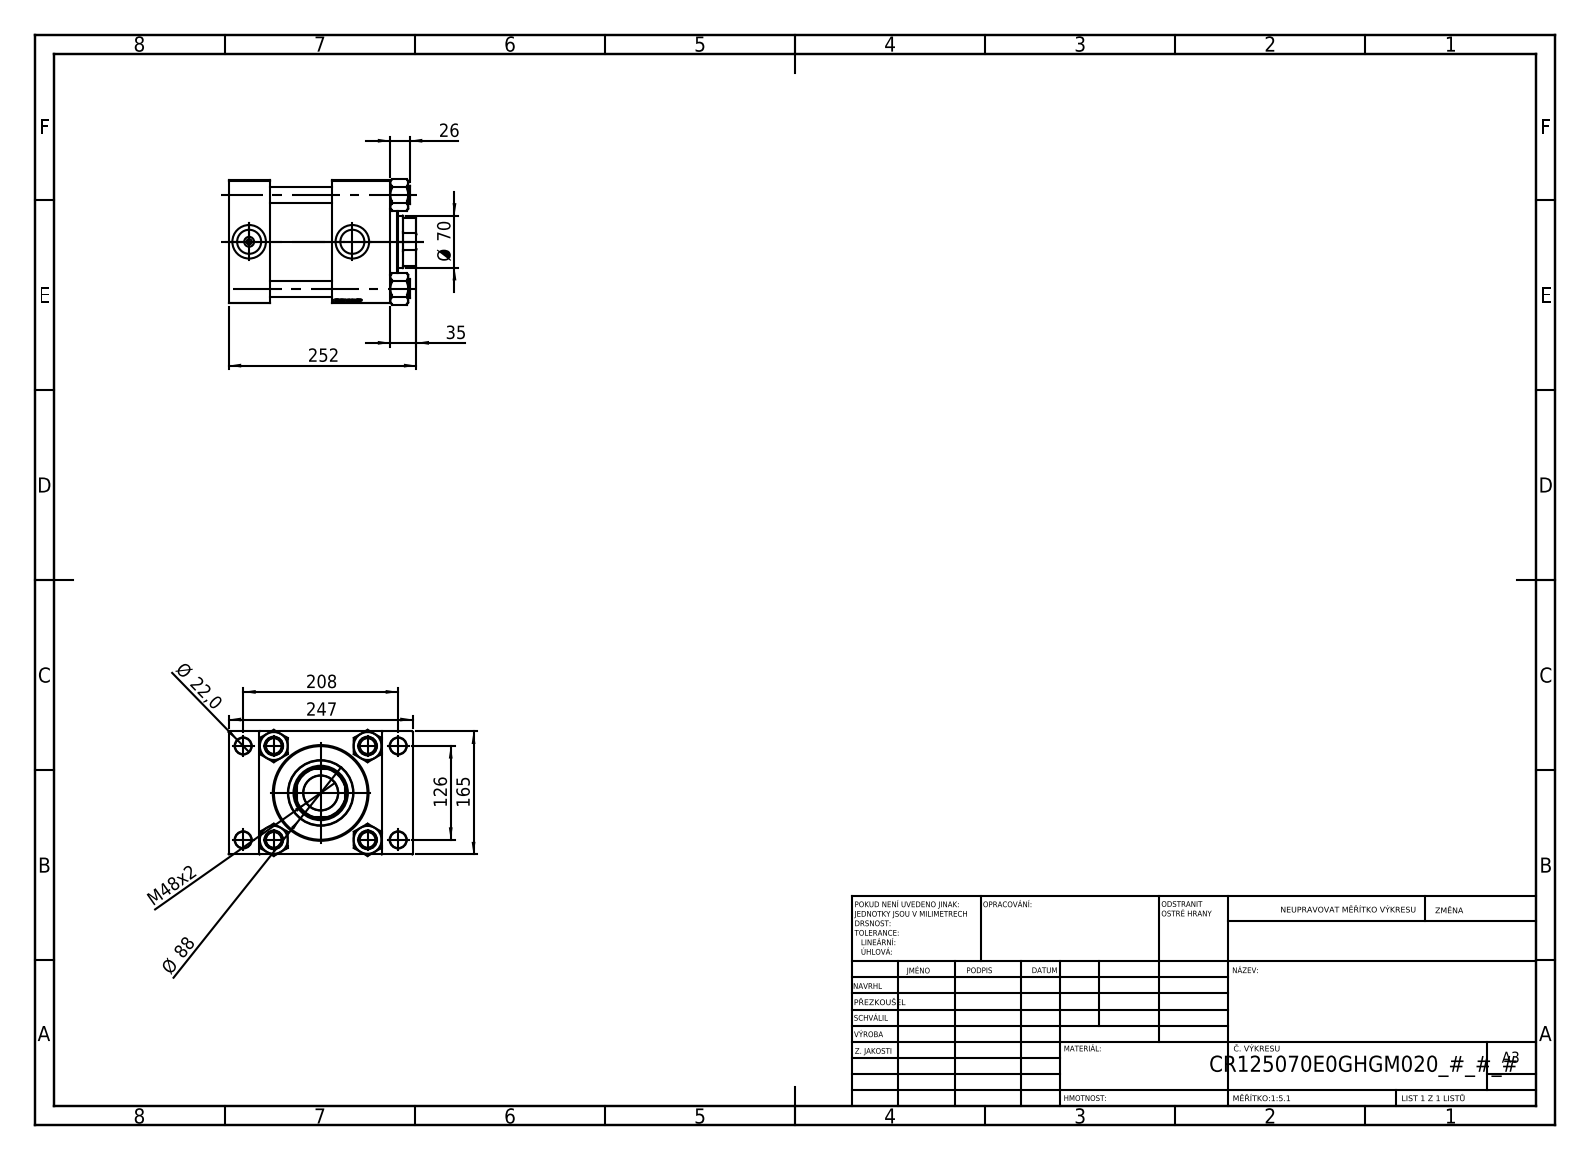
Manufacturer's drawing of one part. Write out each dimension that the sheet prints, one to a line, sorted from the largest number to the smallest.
252
247
208
165
126
Ø 88
Ø 70
M48x2
35
26
Ø 22,0
